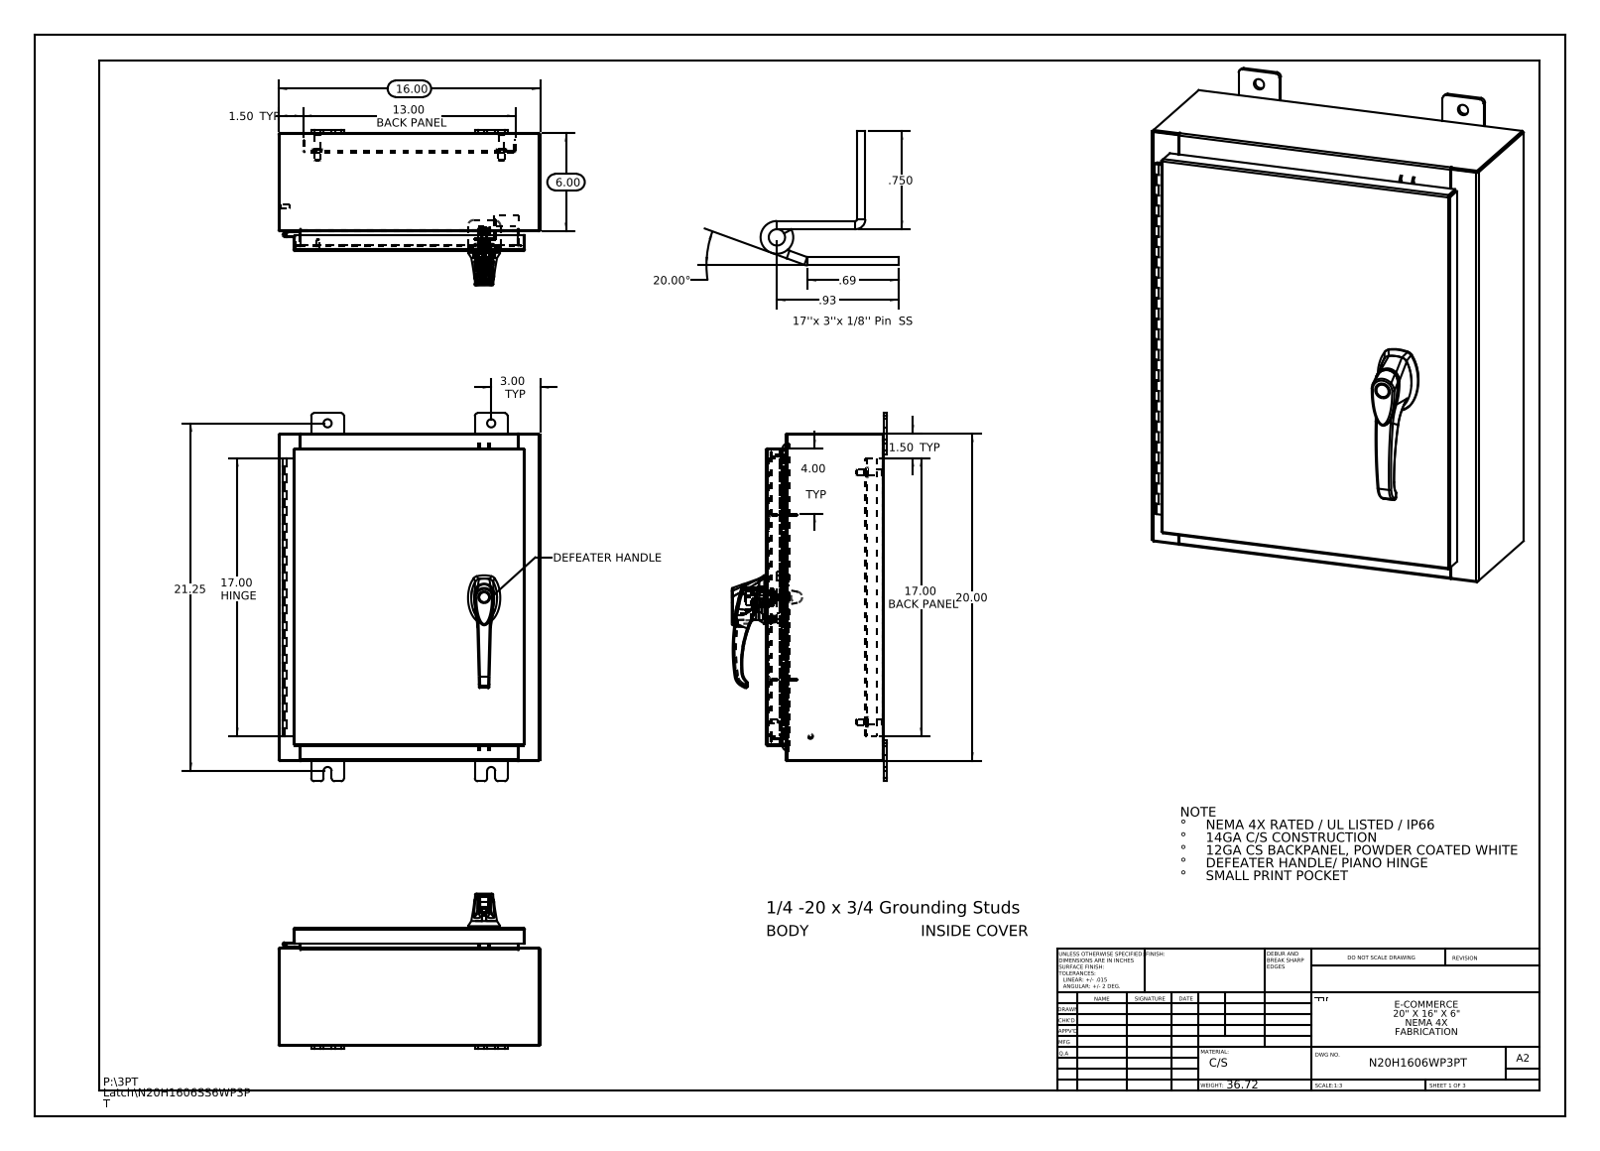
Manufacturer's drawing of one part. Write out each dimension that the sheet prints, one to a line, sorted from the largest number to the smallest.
21.25
20.00
20.00°
17.00 HINGE
17.00 BACK PANEL
16.00
13.00 BACK PANEL
6.00
4.00 TYP
3.00 TYP
1.50 TYP
1.50 TYP
.93
.750
.69
